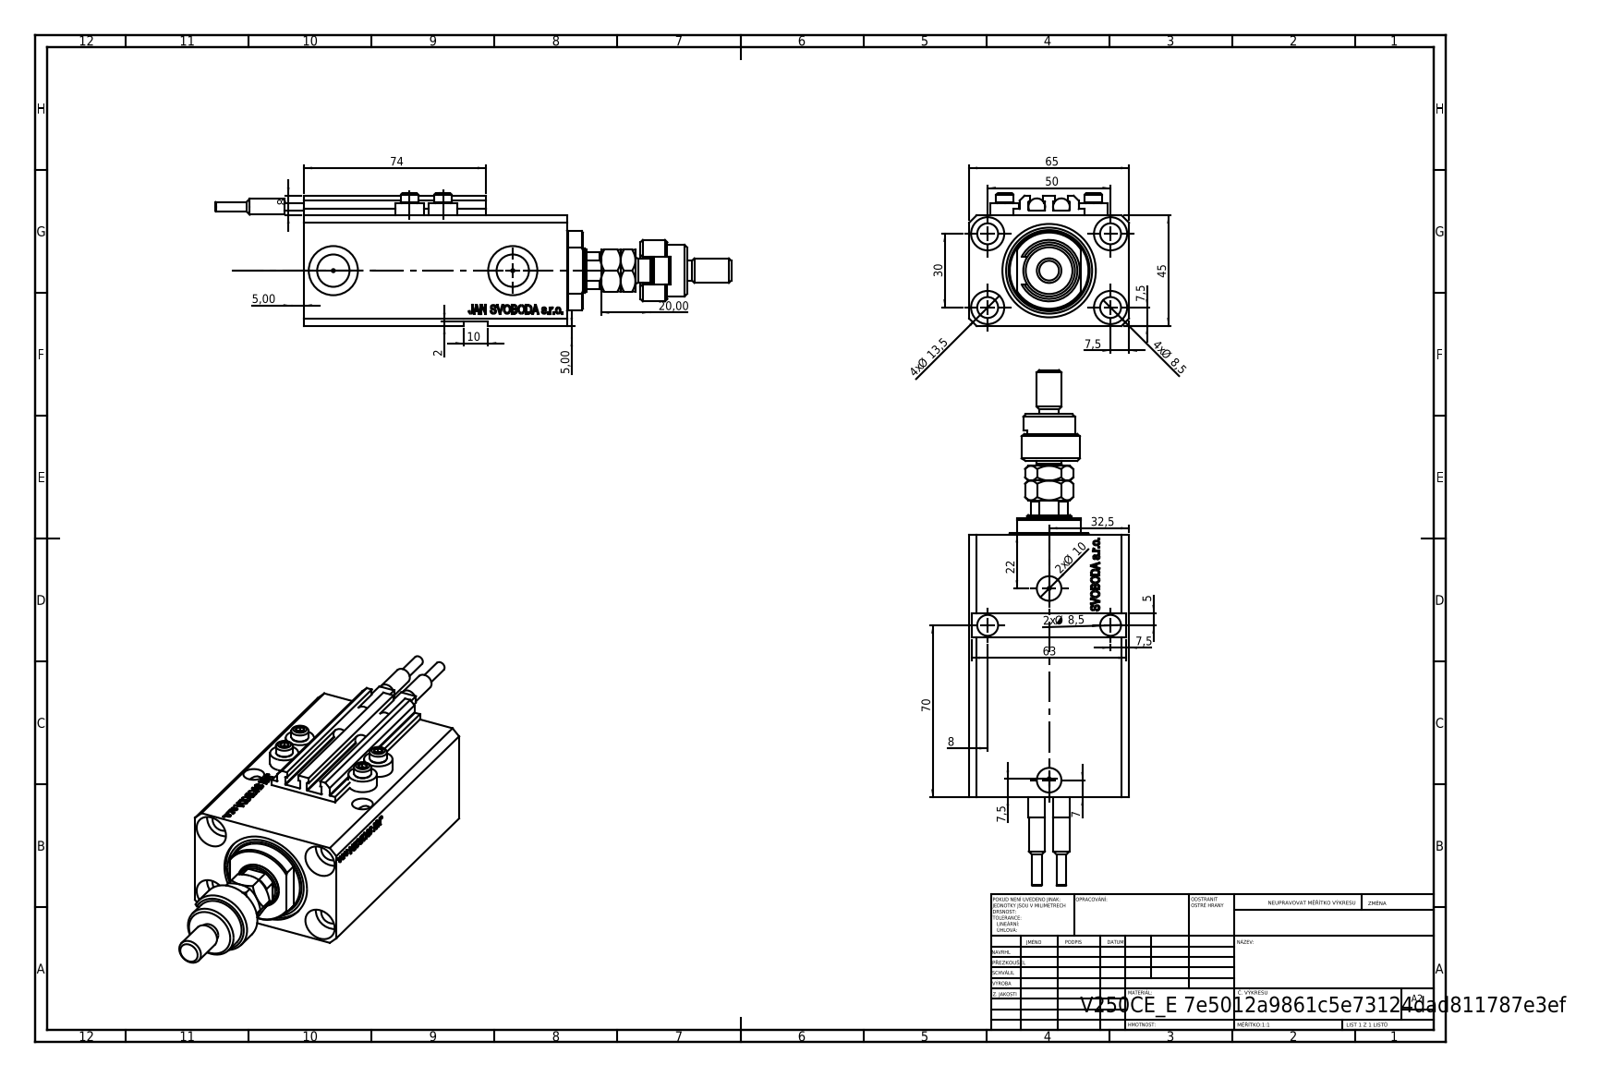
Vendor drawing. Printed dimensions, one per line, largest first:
74
70
65
63
50
45
32,5
30
22
20,00
4x Ø 13,5
10
2x Ø 10
4x Ø 8,5
2x Ø 8,5
8
8
7,5
7,5
7,5
7,5
7
5,00
5,00
5
2
